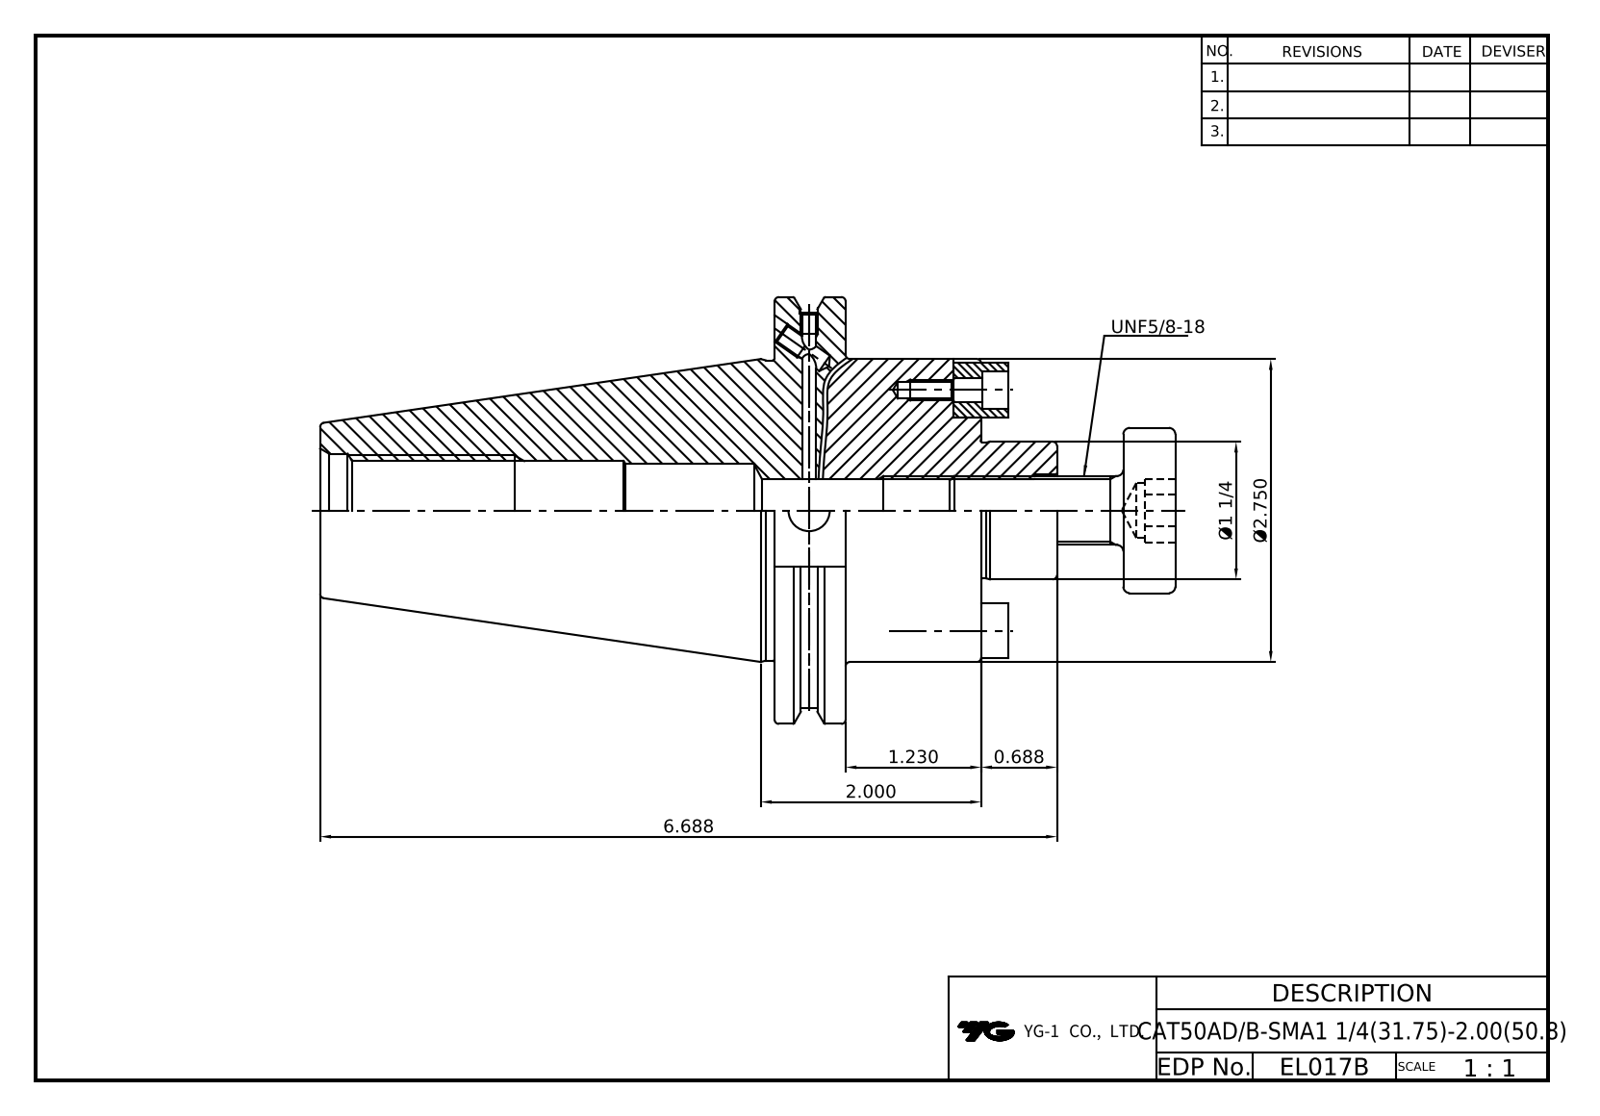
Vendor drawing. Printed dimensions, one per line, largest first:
6.688
Ø2.750
2.000
Ø1 1/4
1.230
0.688
